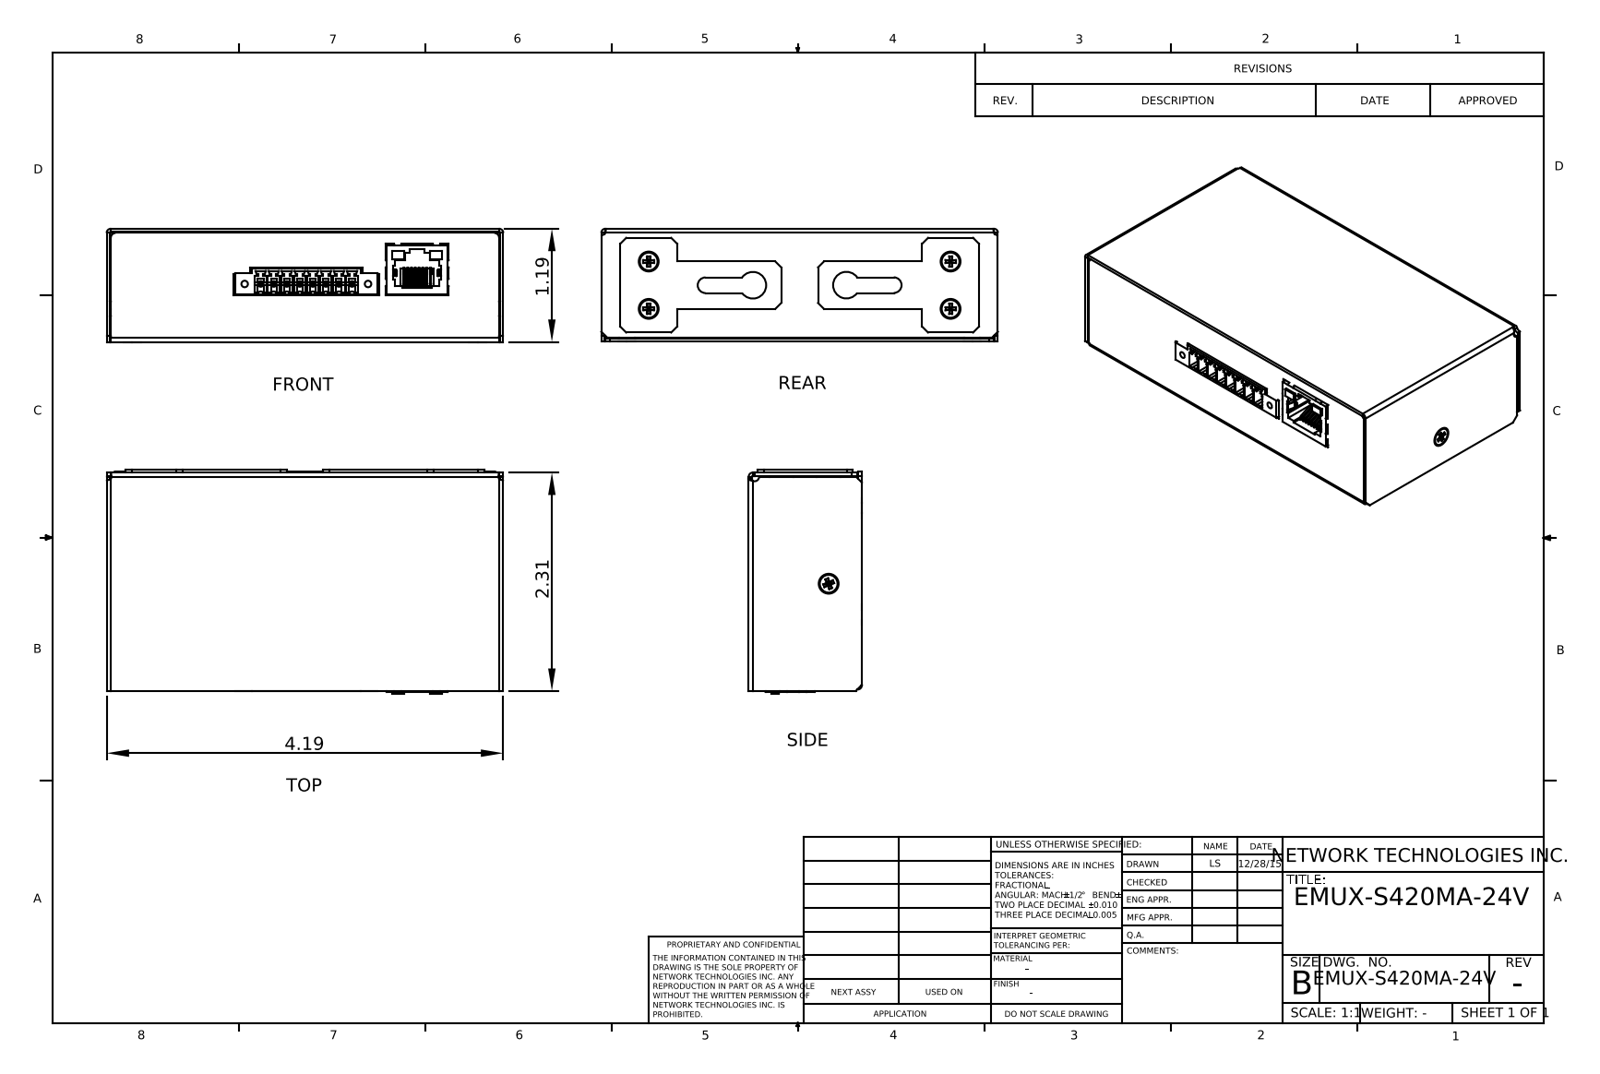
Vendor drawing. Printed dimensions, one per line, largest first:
4.19
2.31
1.19
